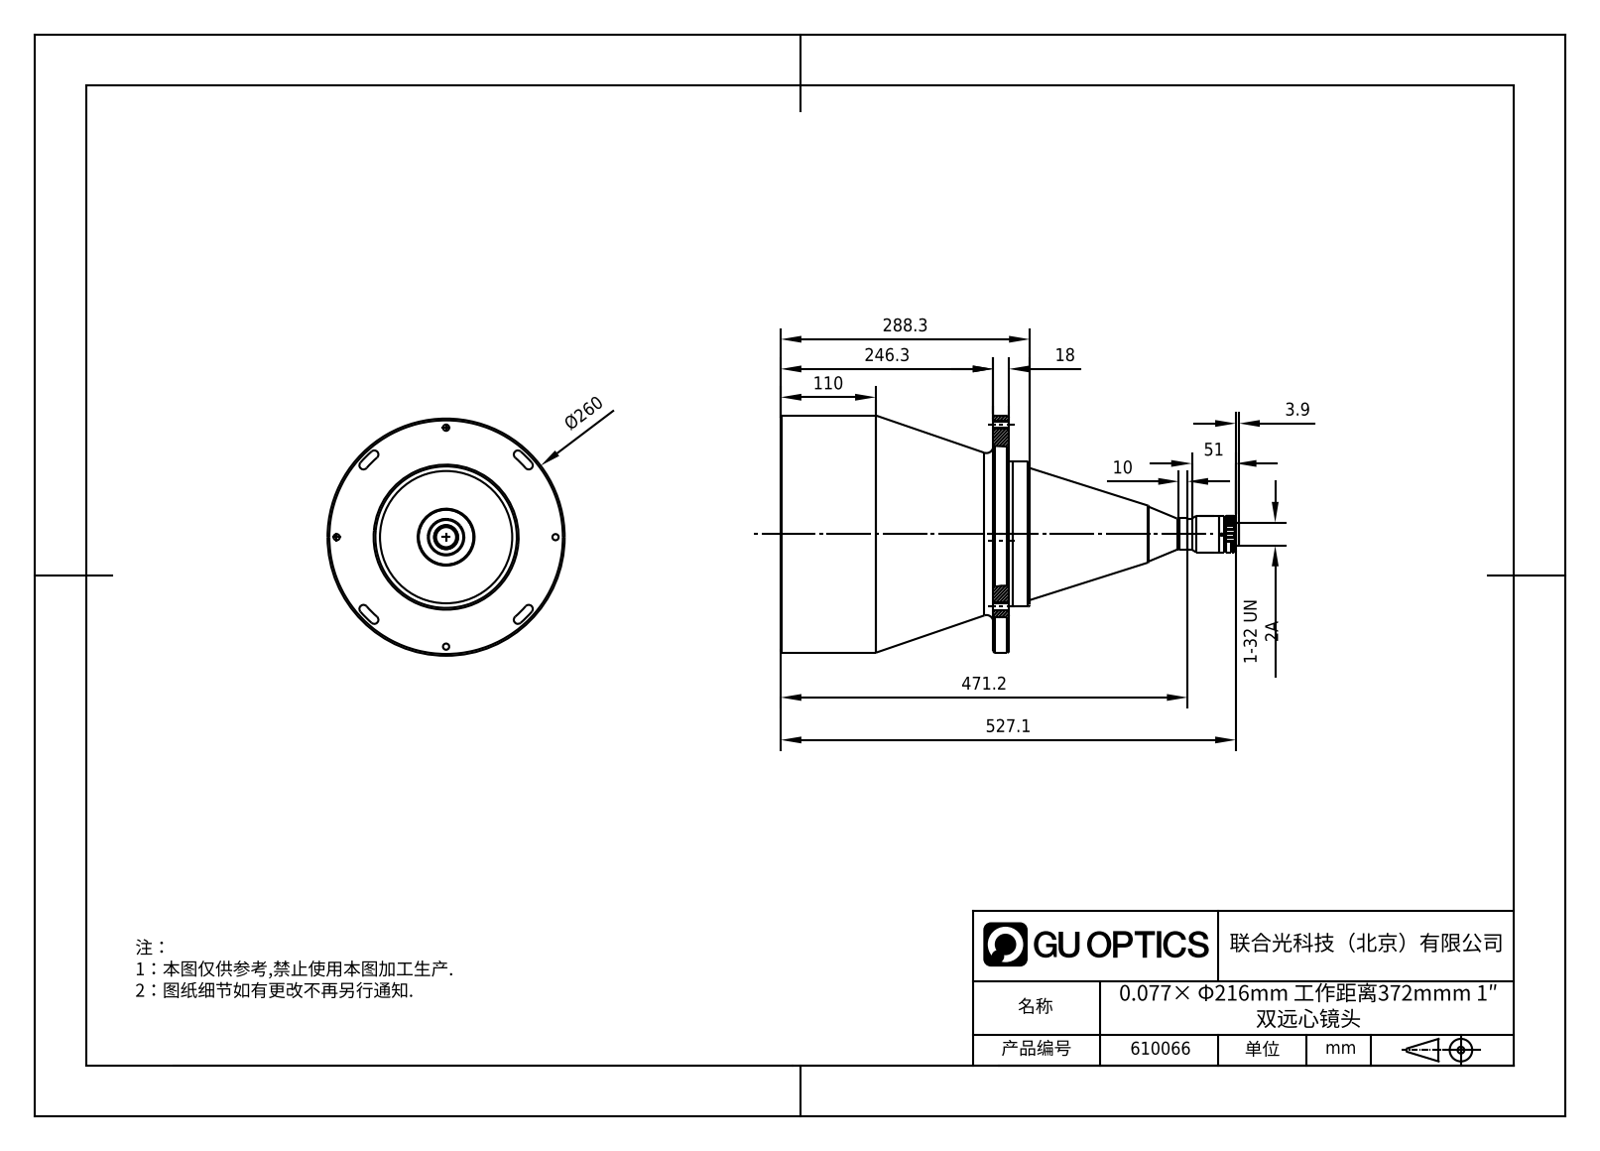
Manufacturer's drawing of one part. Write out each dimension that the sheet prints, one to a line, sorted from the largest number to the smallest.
527.1
471.2
288.3
Ø260
246.3
110
51
18
10
3.9
1-32 UN 2A
